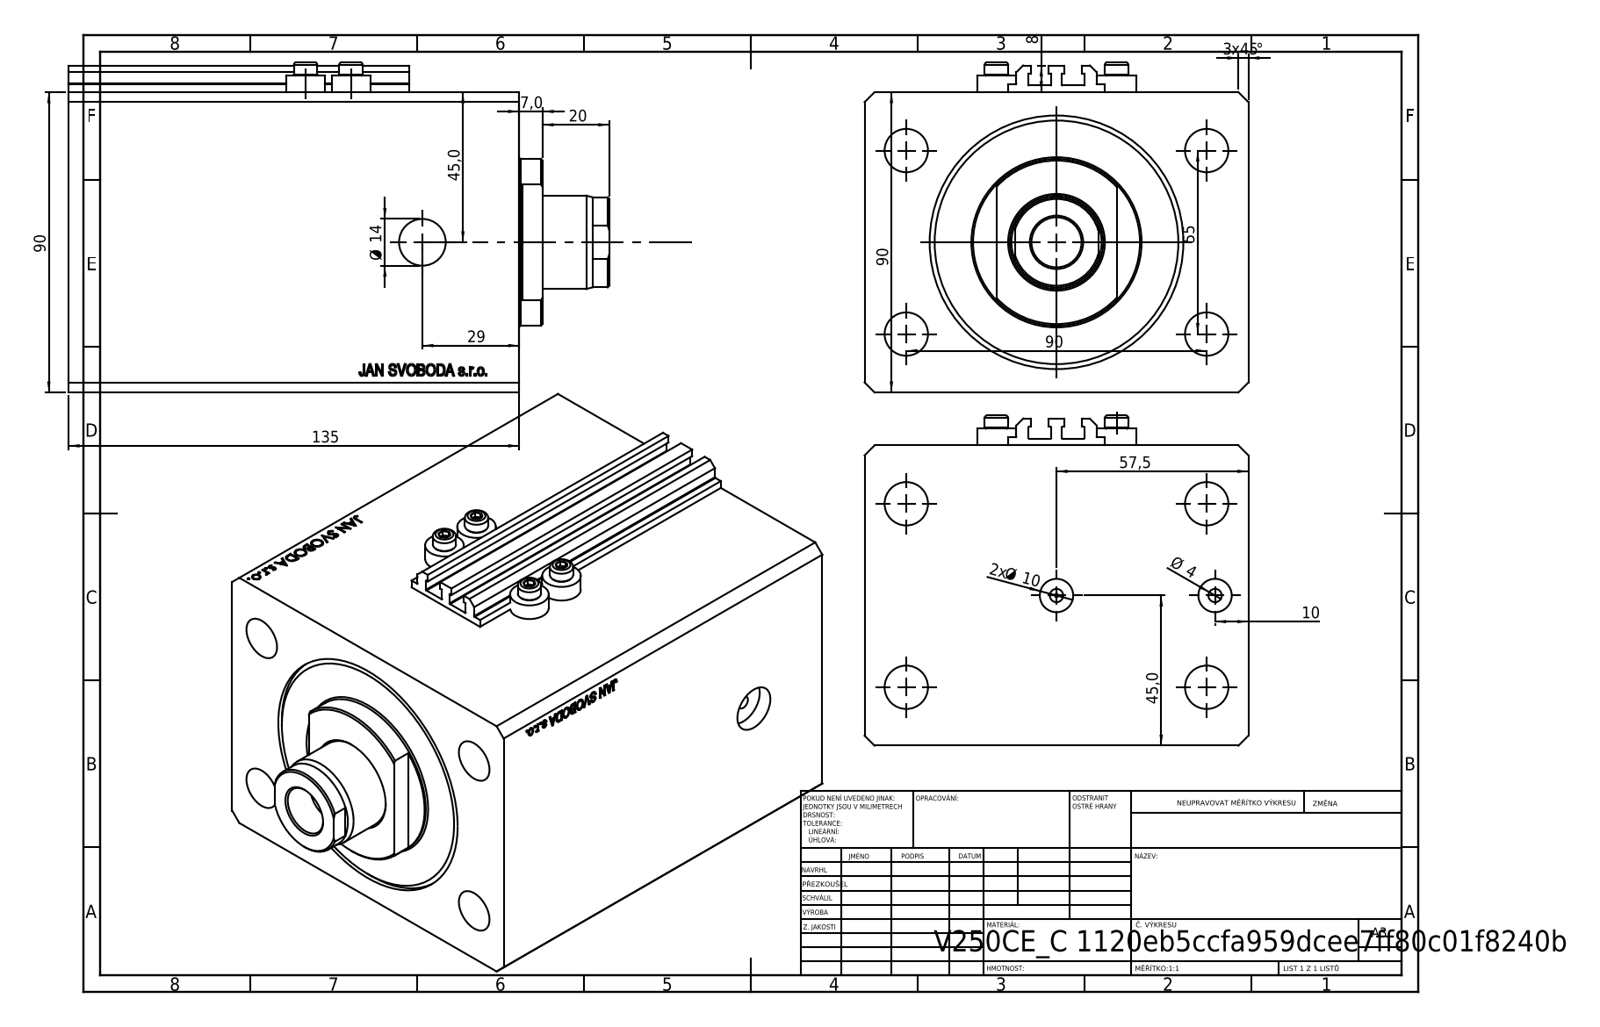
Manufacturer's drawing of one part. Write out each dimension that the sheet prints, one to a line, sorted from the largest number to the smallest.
135
90
90
90
57,5
55
3 x45 °
45,0
45,0
29
20
Ø 14
2x Ø 10
10
8
7,0
Ø 4
